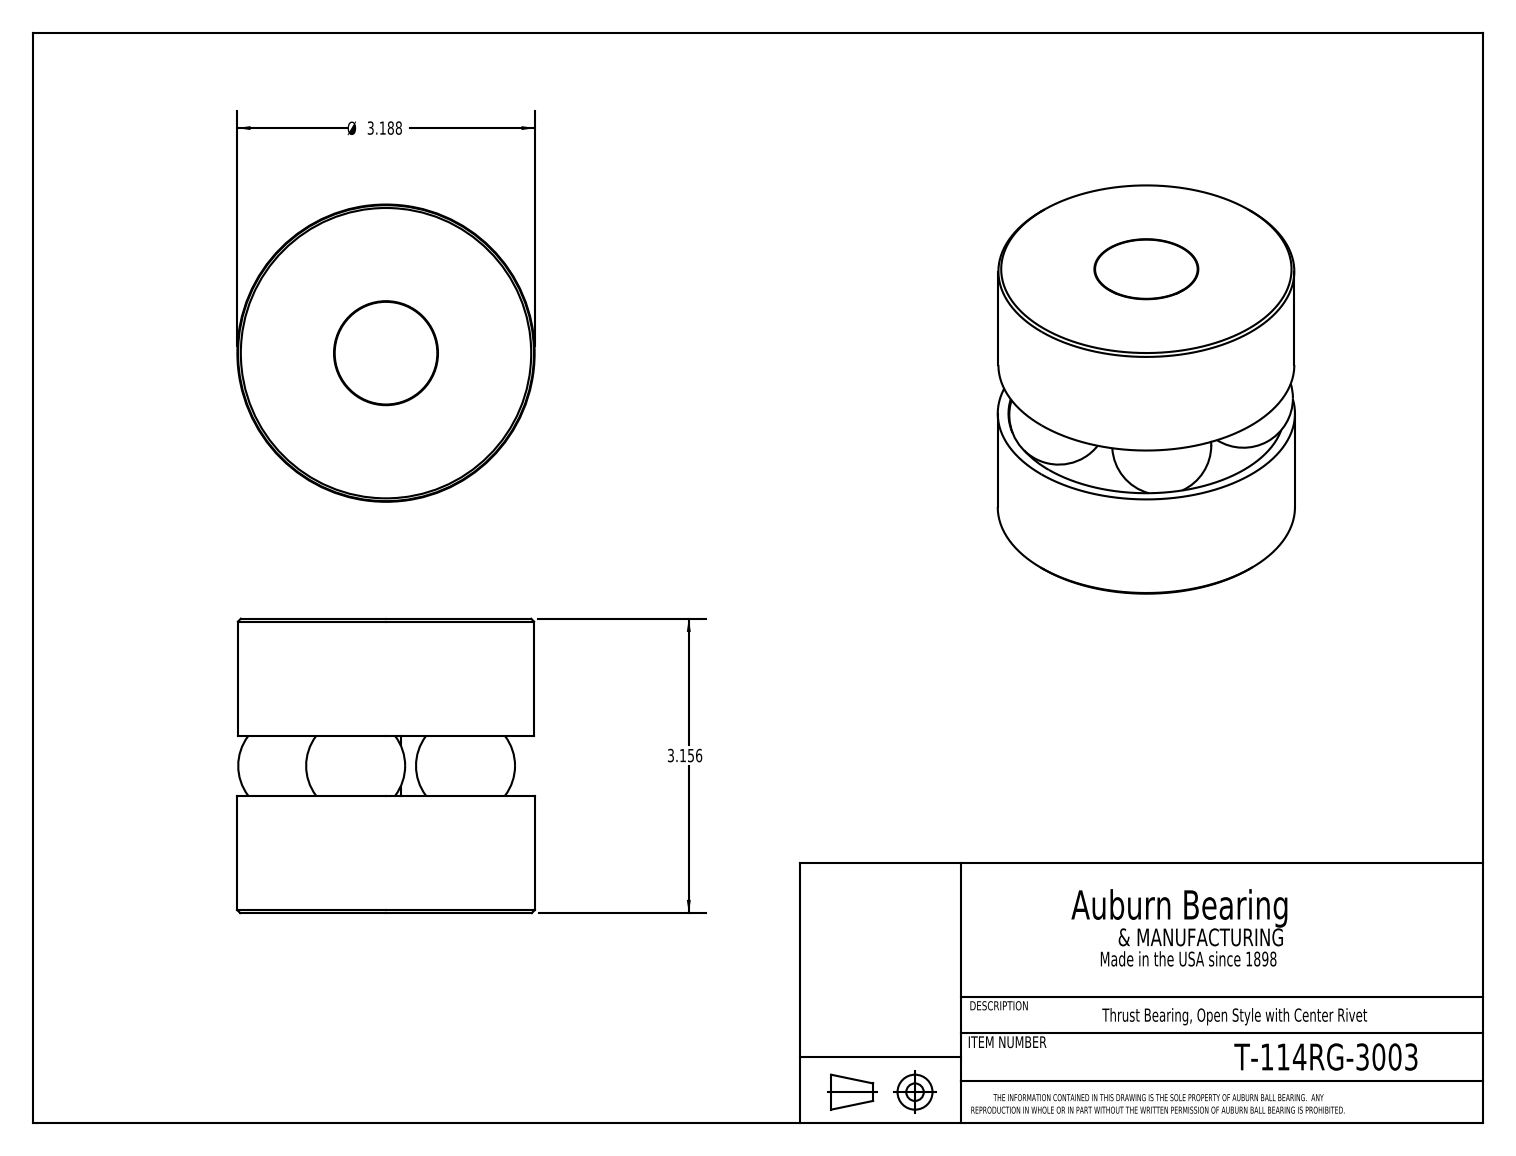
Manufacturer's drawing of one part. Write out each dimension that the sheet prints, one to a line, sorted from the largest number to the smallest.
Ø 3.188
3.156
